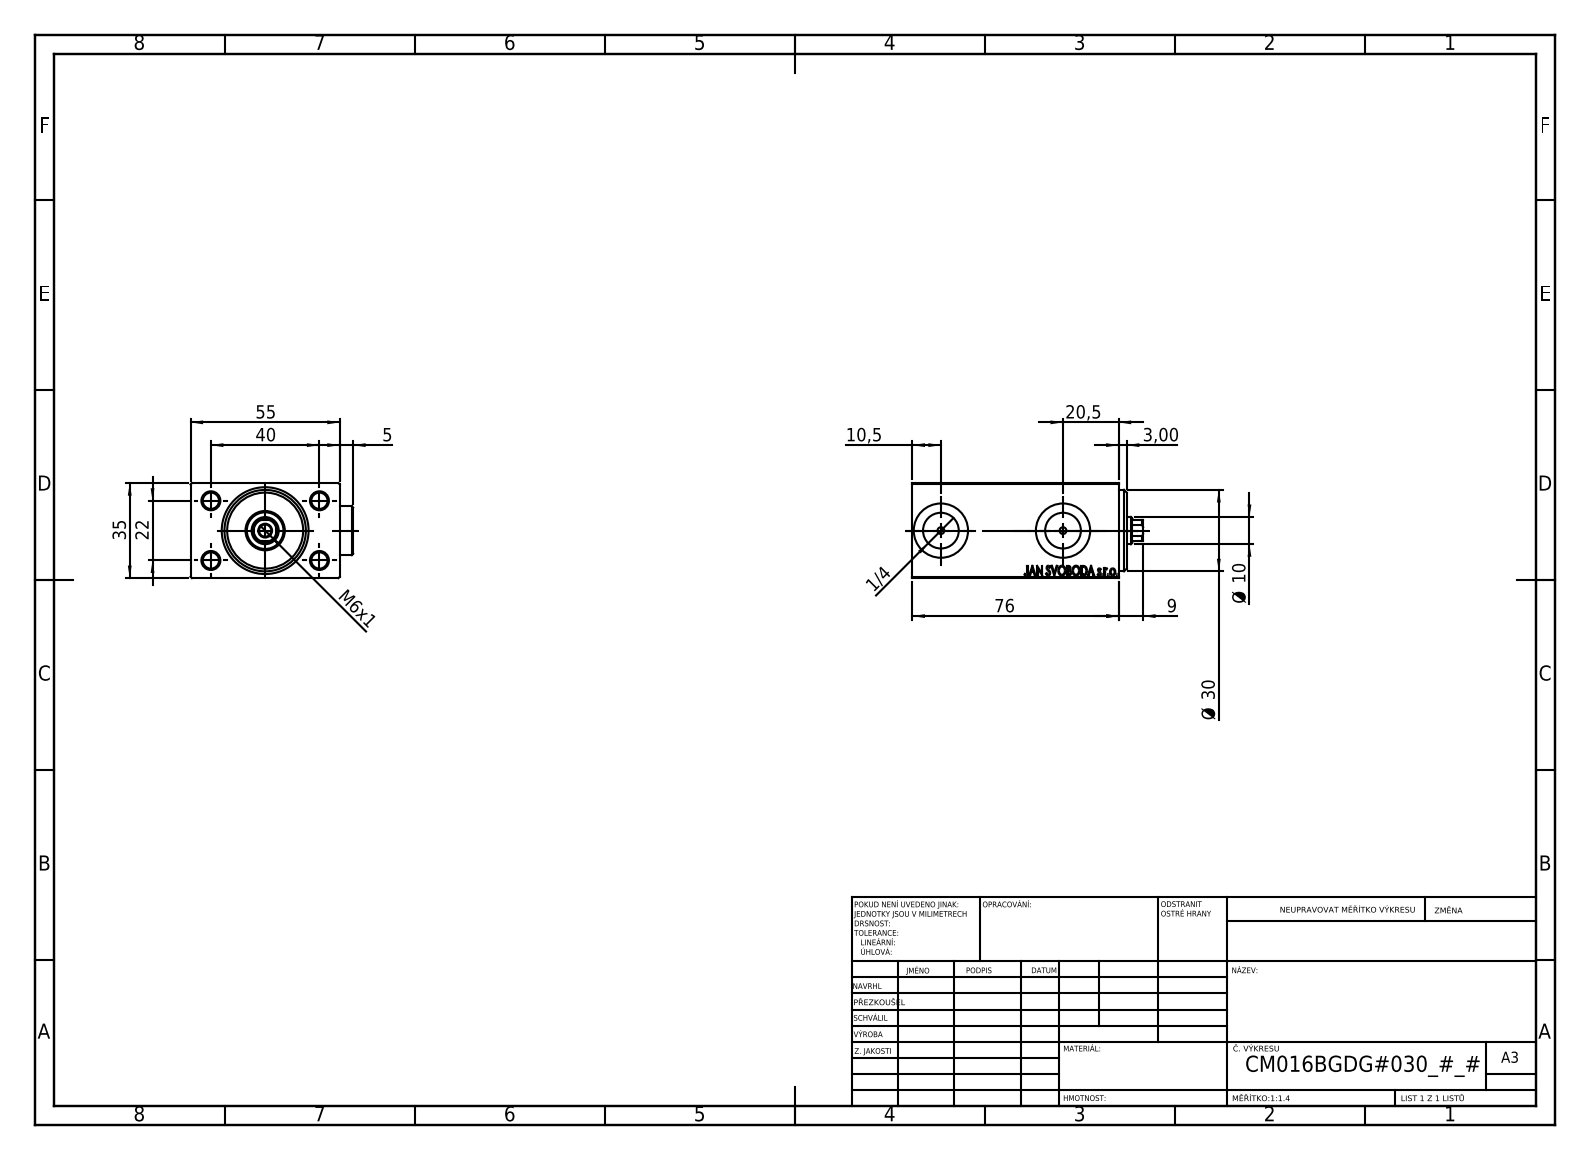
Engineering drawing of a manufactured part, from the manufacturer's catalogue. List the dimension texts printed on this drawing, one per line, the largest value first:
76
55
40
35
Ø 30
22
20,5
10,5
Ø 10
9
M6x1
5
3,00
1/4
